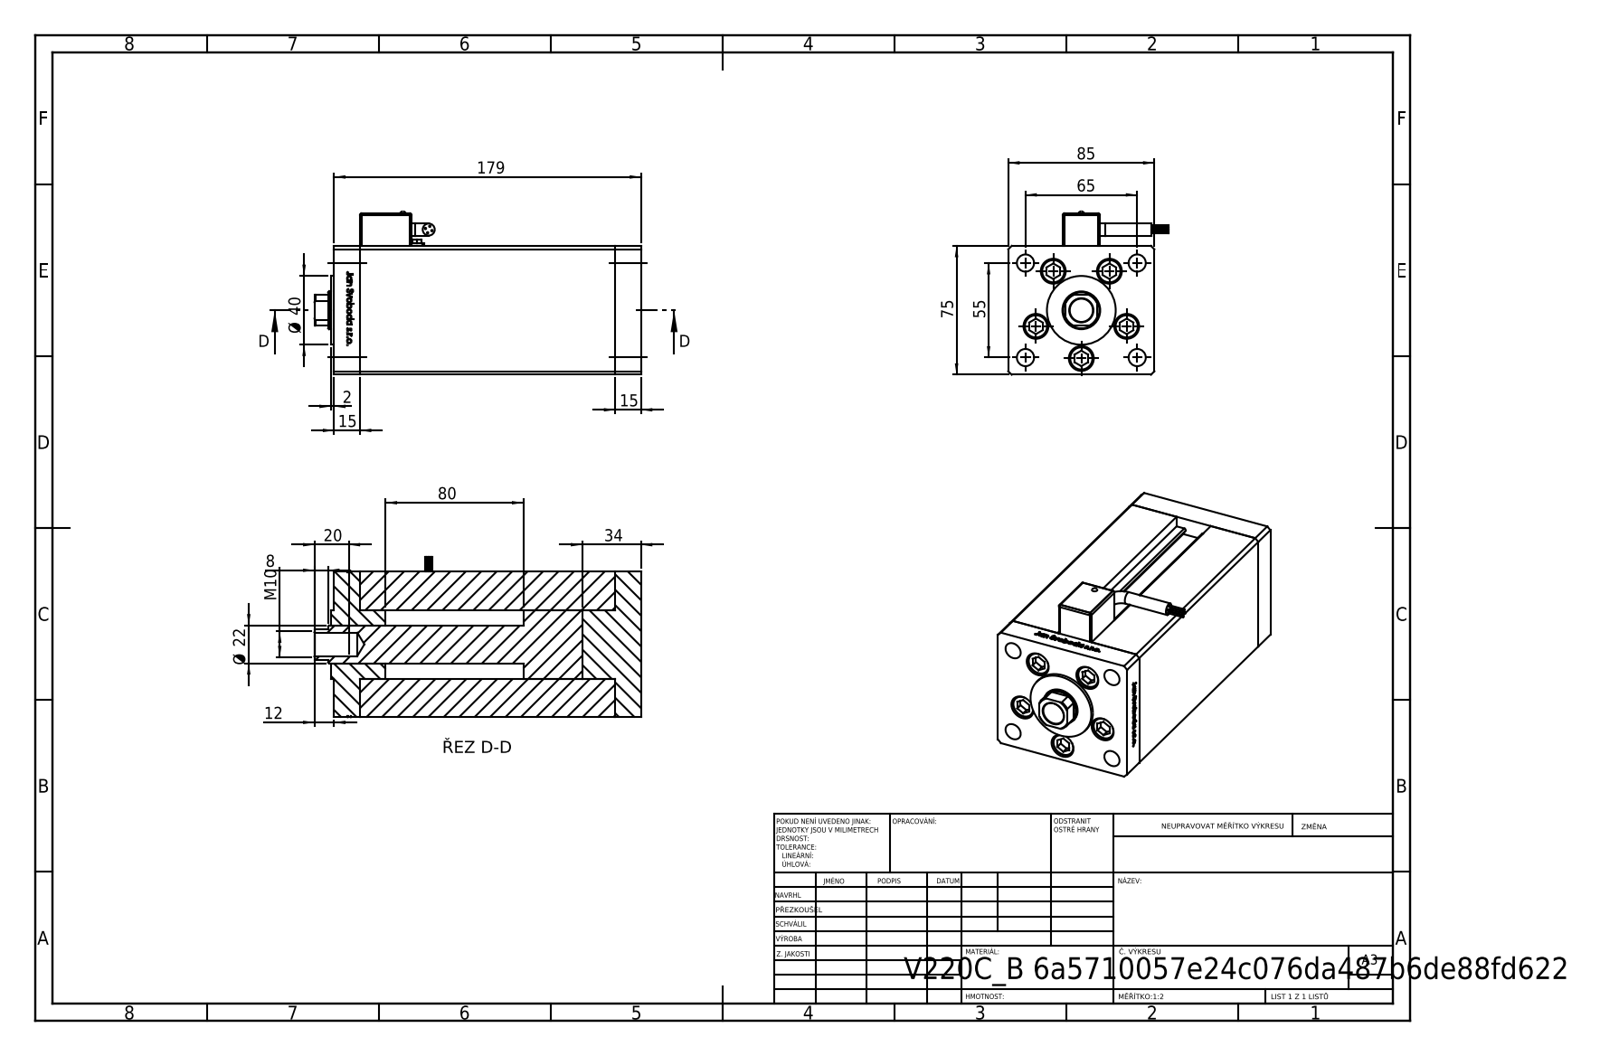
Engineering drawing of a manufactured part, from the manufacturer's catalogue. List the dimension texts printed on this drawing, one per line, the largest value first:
179
85
80
75
65
55
Ø 40
34
Ø 22
20
15
15
12
M10
8
2
